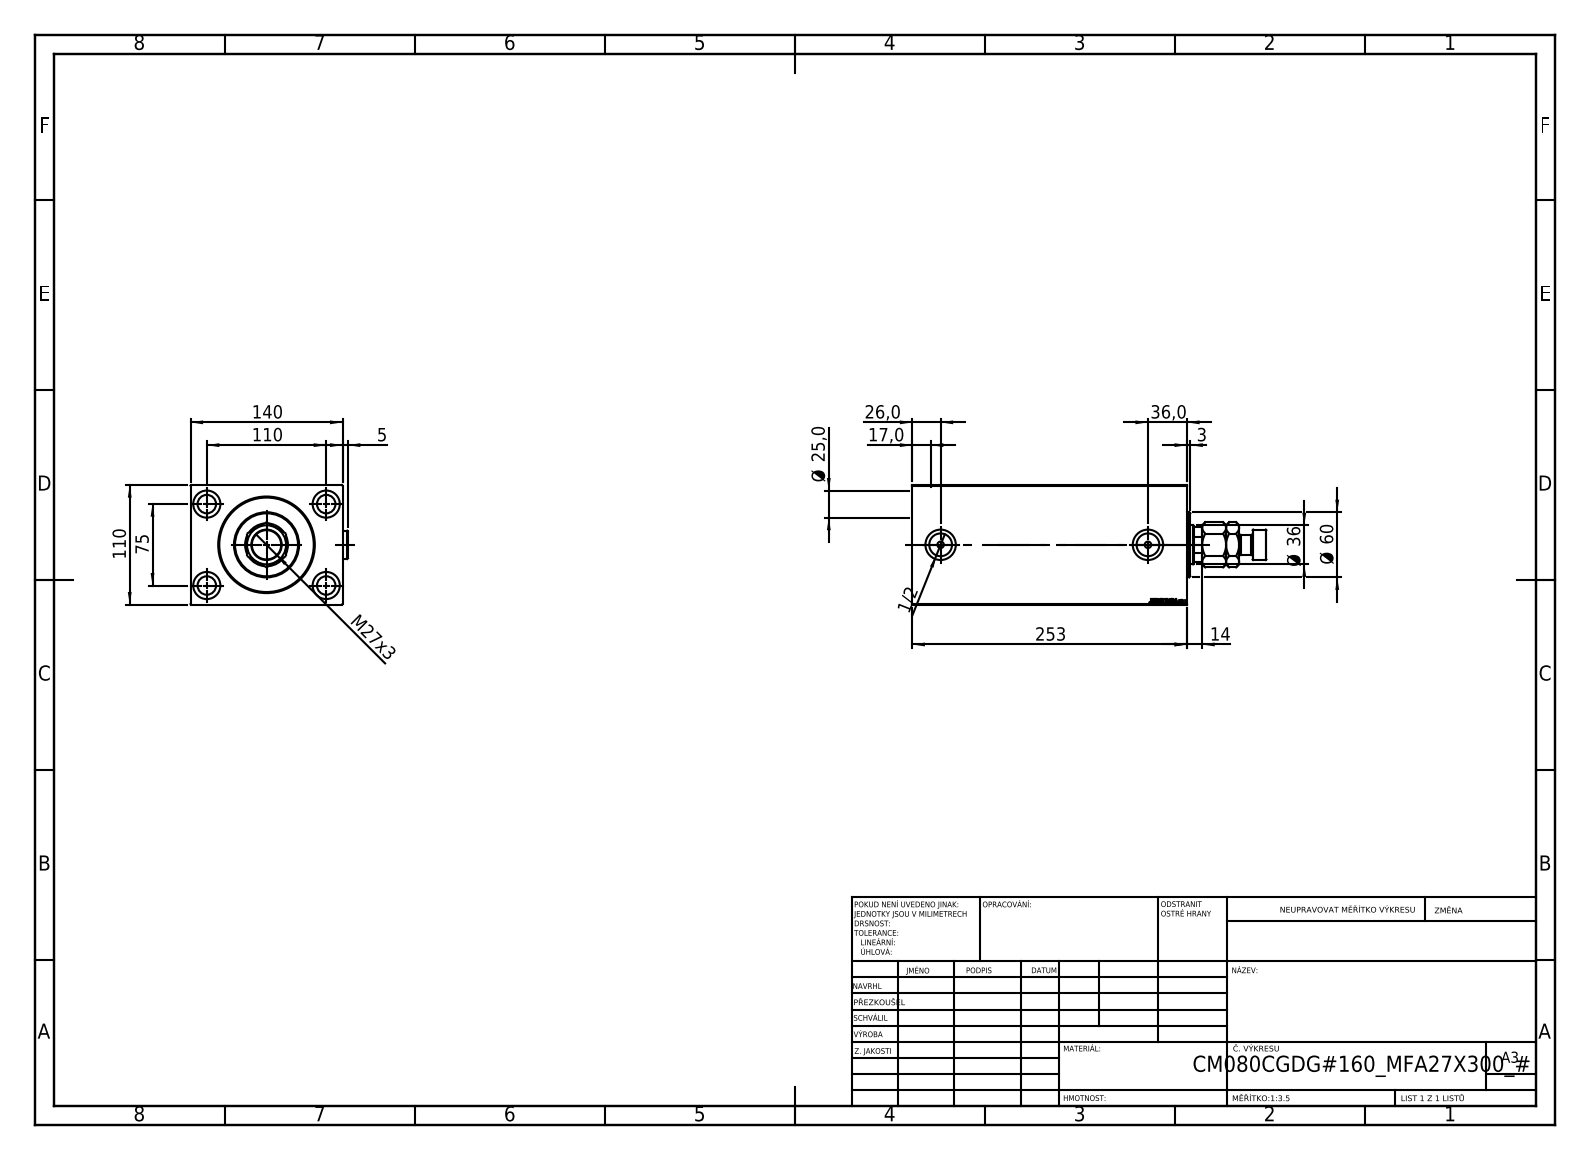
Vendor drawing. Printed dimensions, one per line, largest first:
253
140
110
110
75
Ø 60
Ø 36
36,0
M27x3
26,0
Ø 25,0
17,0
14
5
3
1/2
